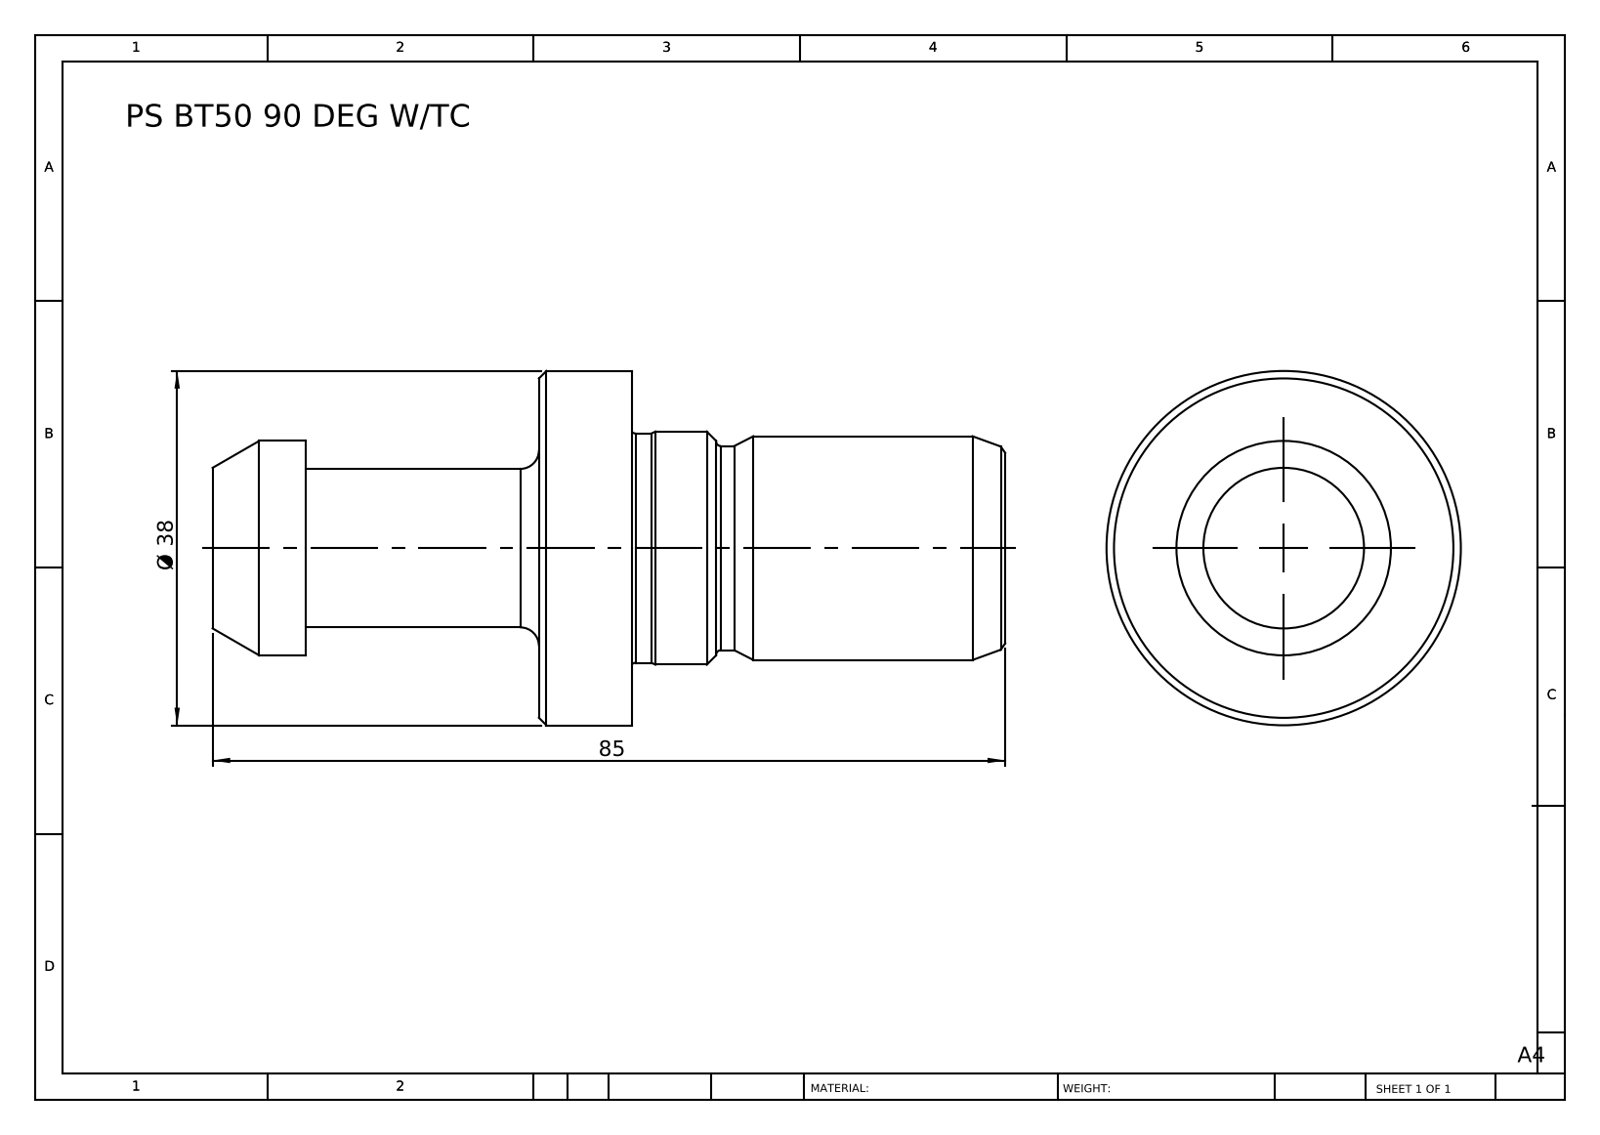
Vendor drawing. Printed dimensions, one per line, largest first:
85
Ø 38
